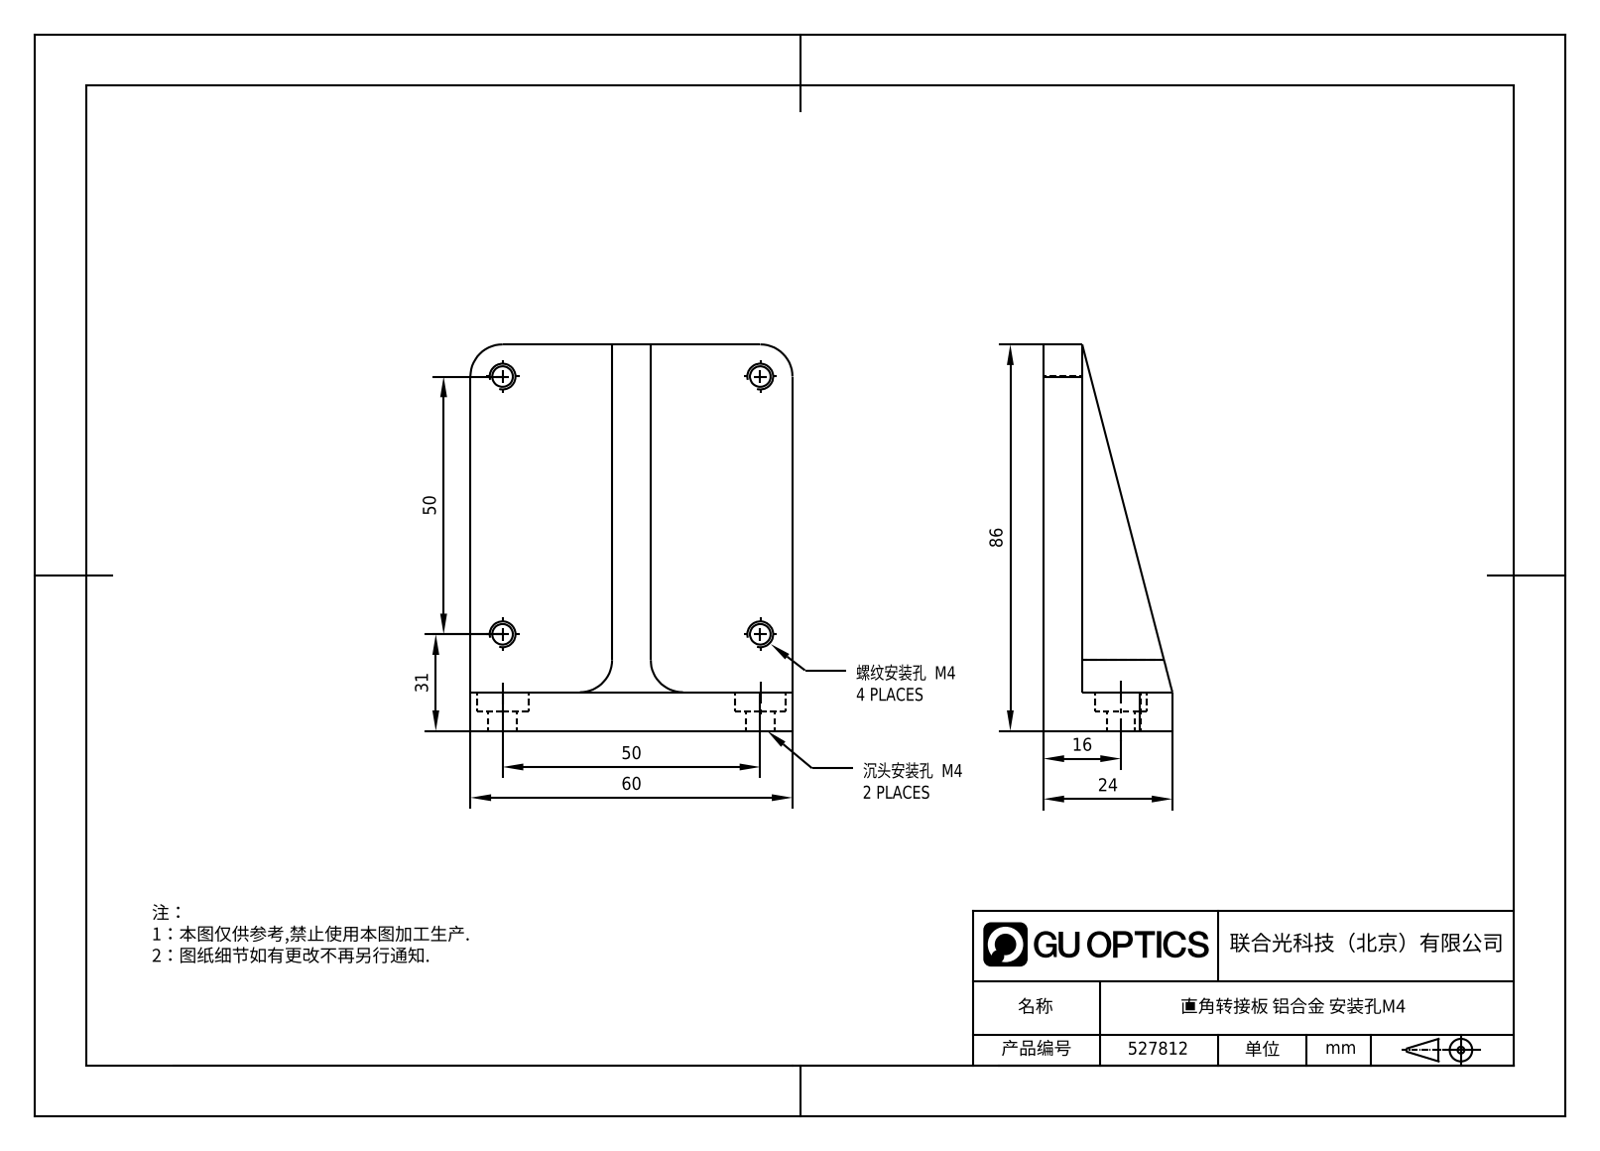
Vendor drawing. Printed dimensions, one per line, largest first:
86
60
50
50
31
24
16
